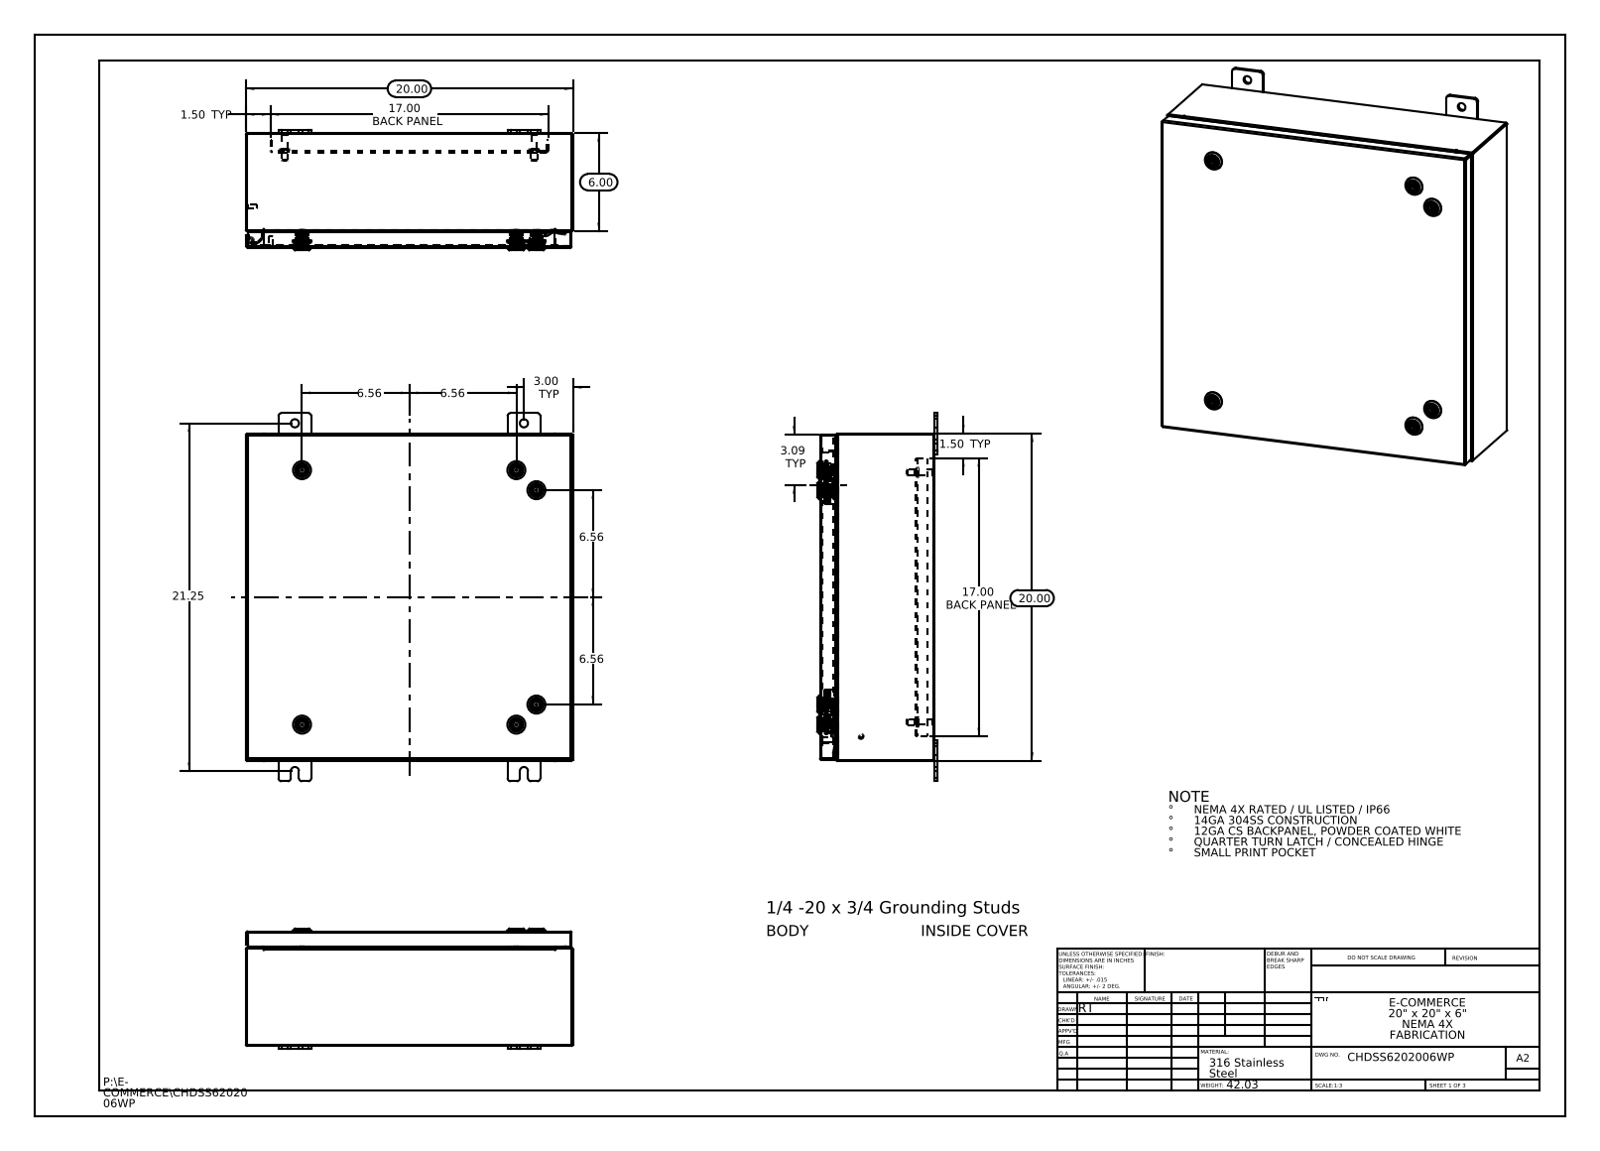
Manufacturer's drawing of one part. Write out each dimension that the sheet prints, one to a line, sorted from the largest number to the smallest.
21.25
20.00
20.00
17.00 BACK PANEL
17.00 BACK PANEL
6.56
6.56
6.56
6.56
6.00
3.09 TYP
3.00 TYP
1.50 TYP
1.50 TYP
